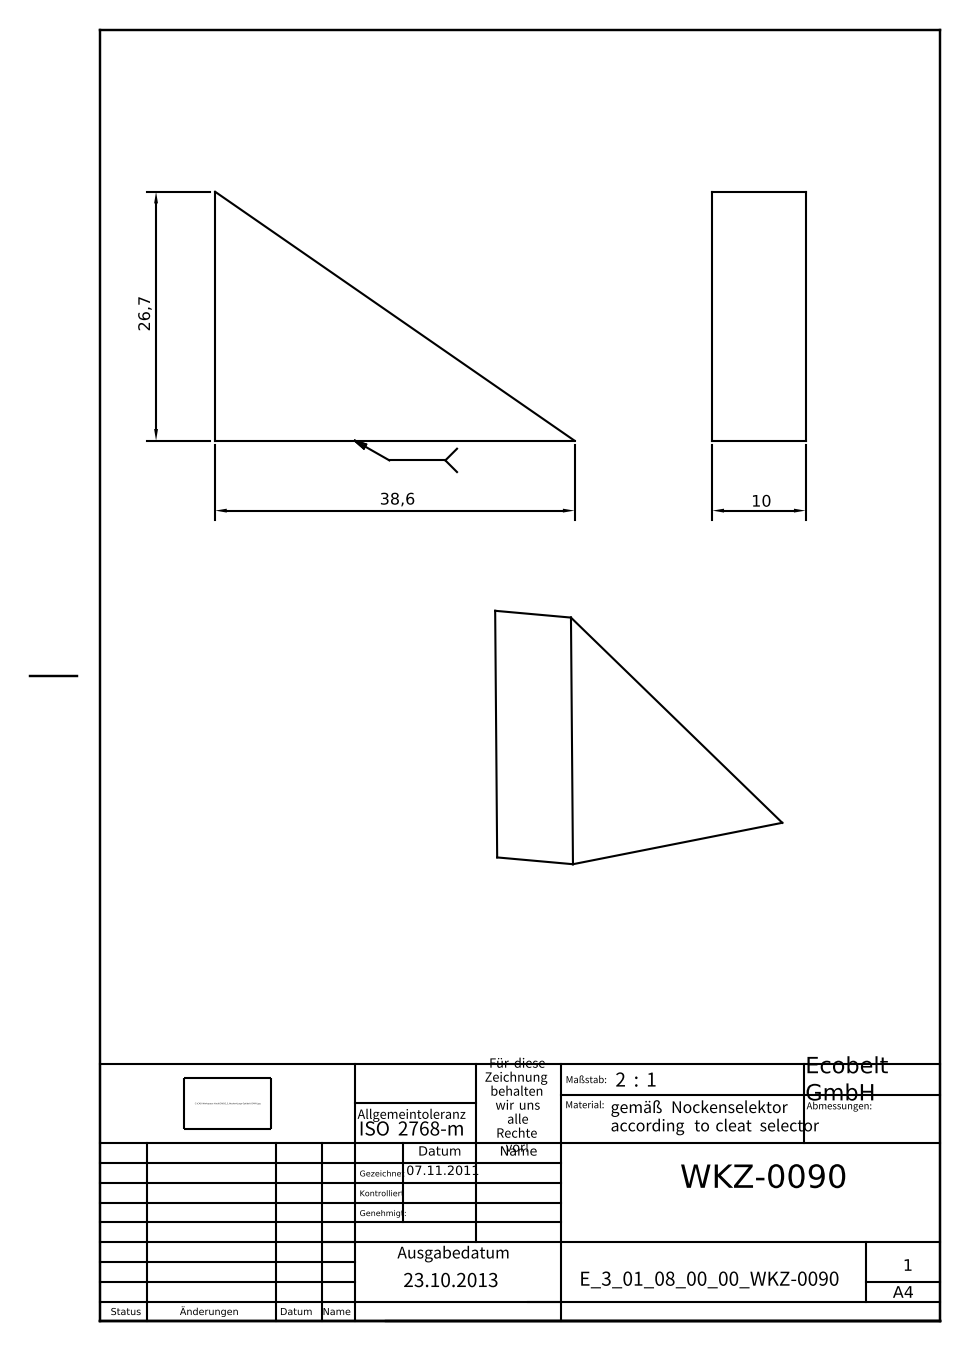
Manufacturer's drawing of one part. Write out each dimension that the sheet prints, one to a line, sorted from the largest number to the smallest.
38,6
26,7
10
